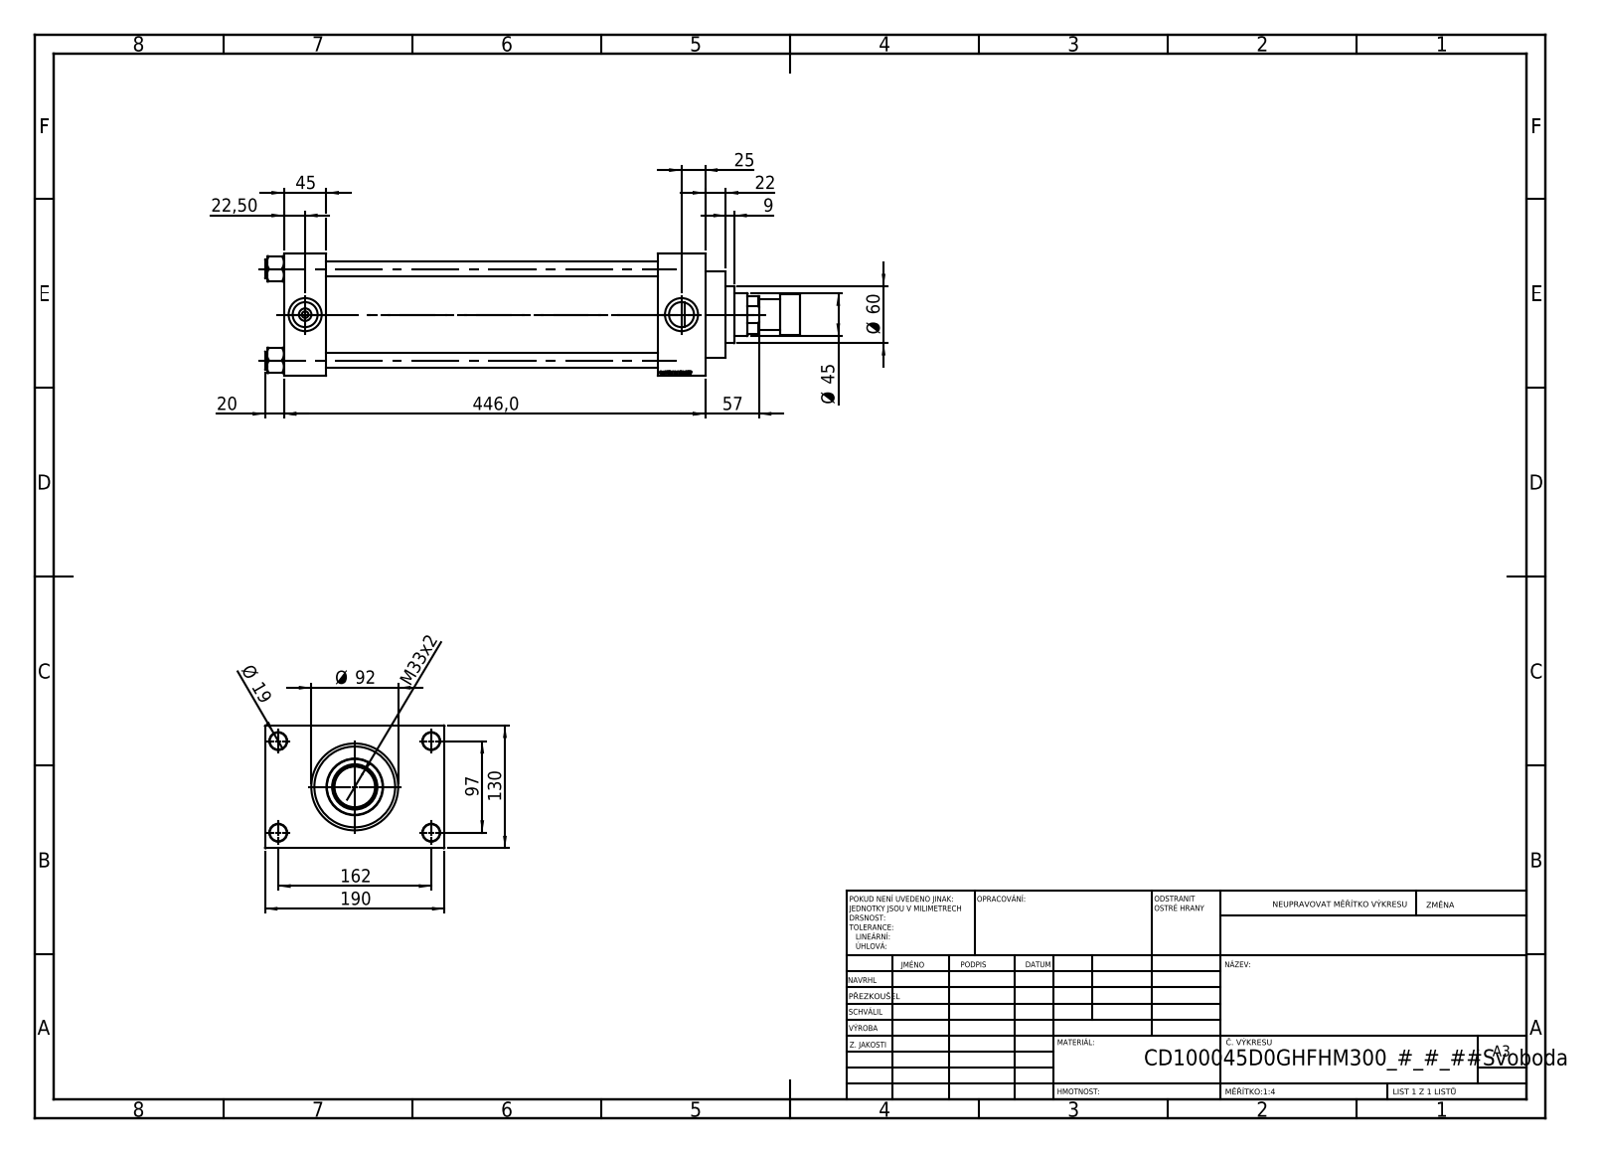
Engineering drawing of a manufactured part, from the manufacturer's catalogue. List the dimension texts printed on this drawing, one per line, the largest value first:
446,0
190
162
130
97
Ø 92
Ø 60
57
Ø 45
45
M33x2
25
22,50
22
20
Ø 19
9
